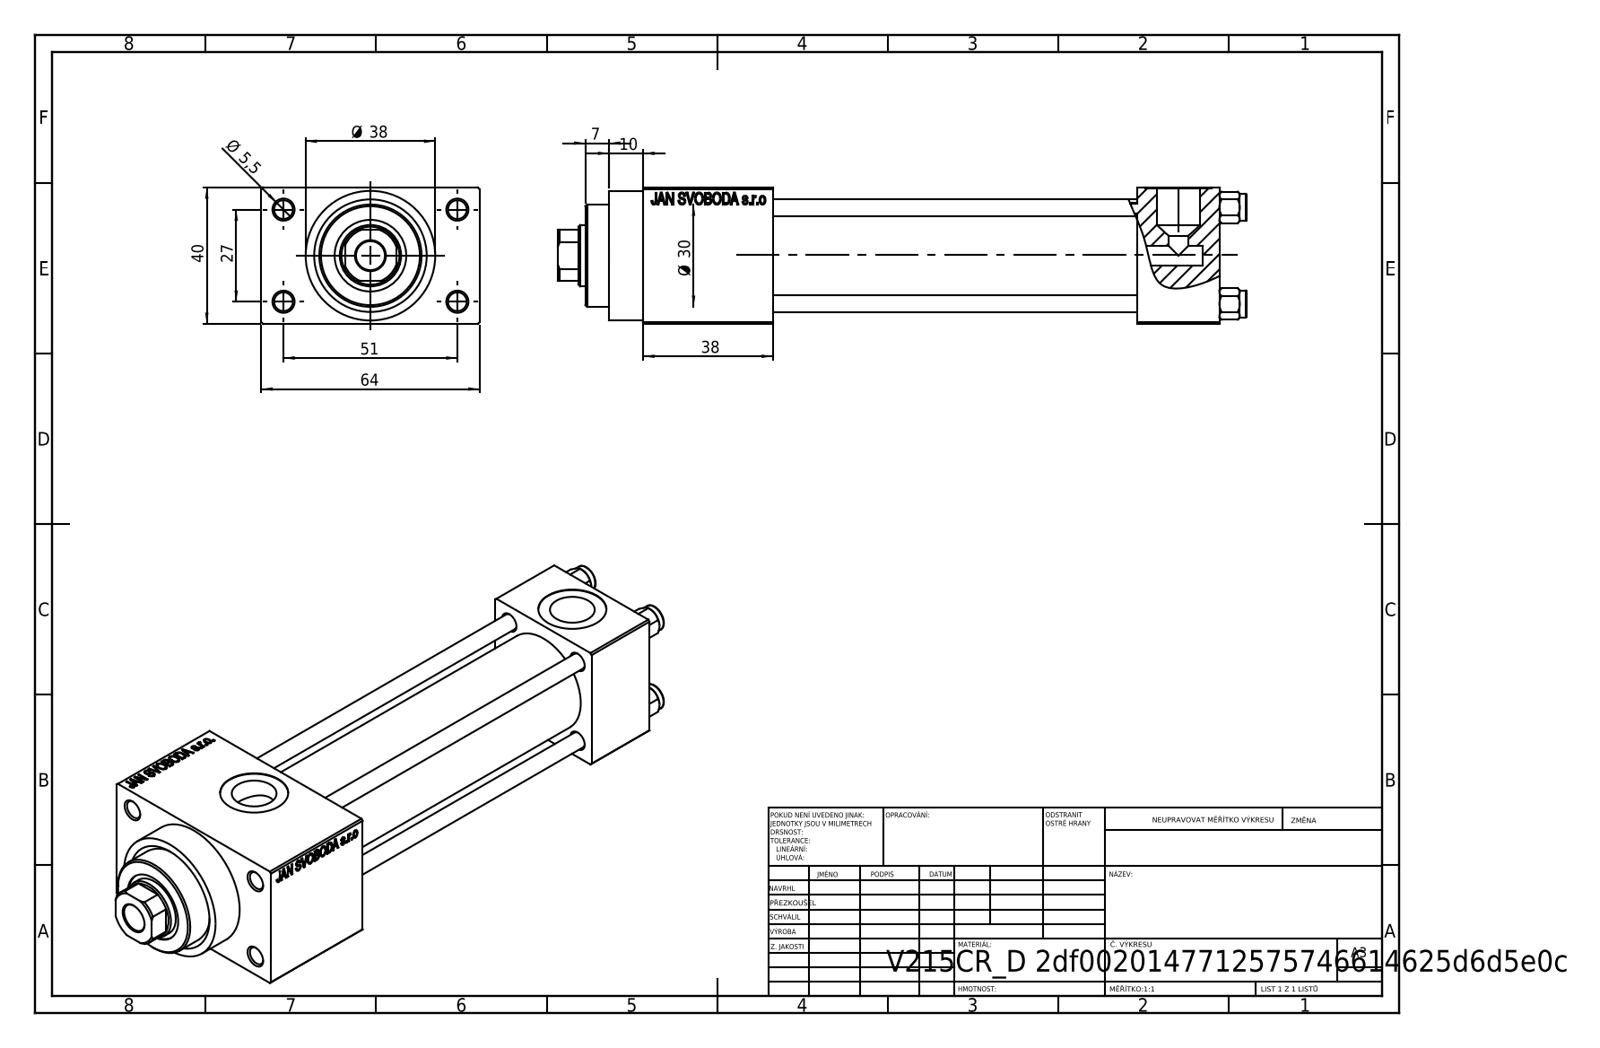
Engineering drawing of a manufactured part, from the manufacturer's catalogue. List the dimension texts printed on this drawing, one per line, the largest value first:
64
51
40
38
Ø 38
Ø 30
27
10
7
Ø 5,5
